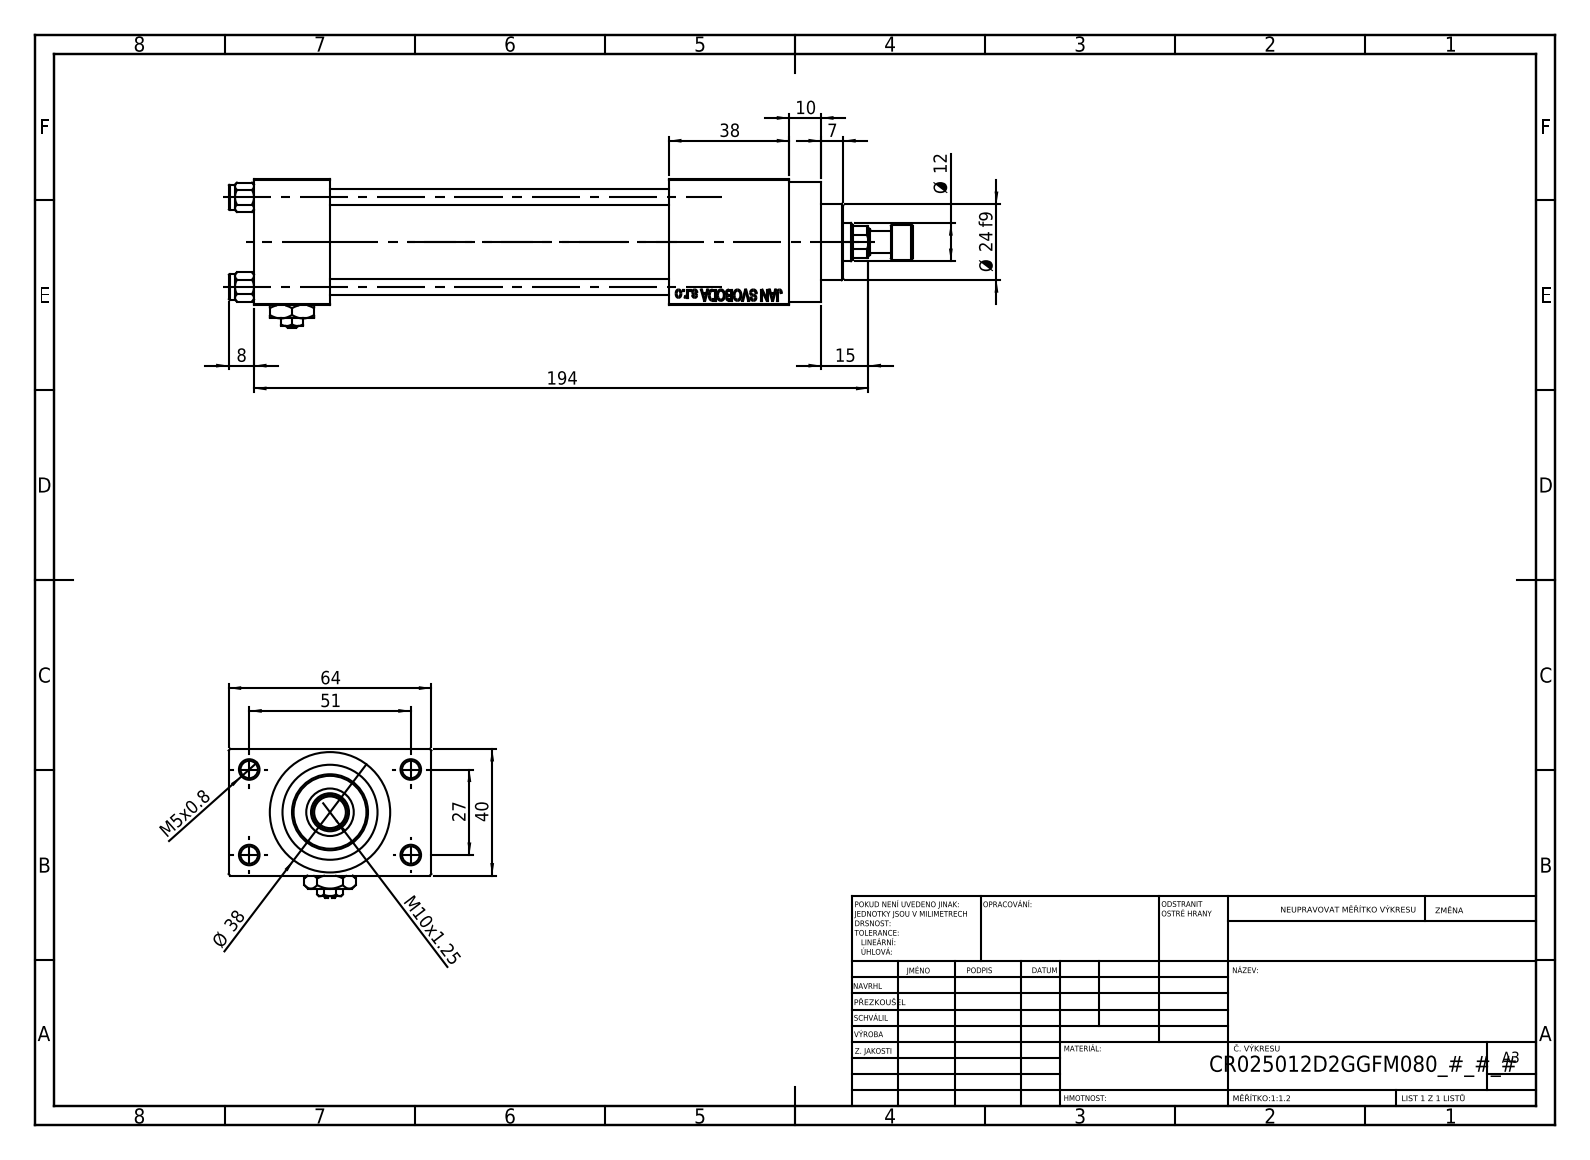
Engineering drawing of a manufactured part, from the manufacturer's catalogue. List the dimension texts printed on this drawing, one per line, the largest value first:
194
64
51
40
38
Ø 38
27
Ø 24 f9
15
Ø 12
10
M10x1.25
8
7
M5x0.8
